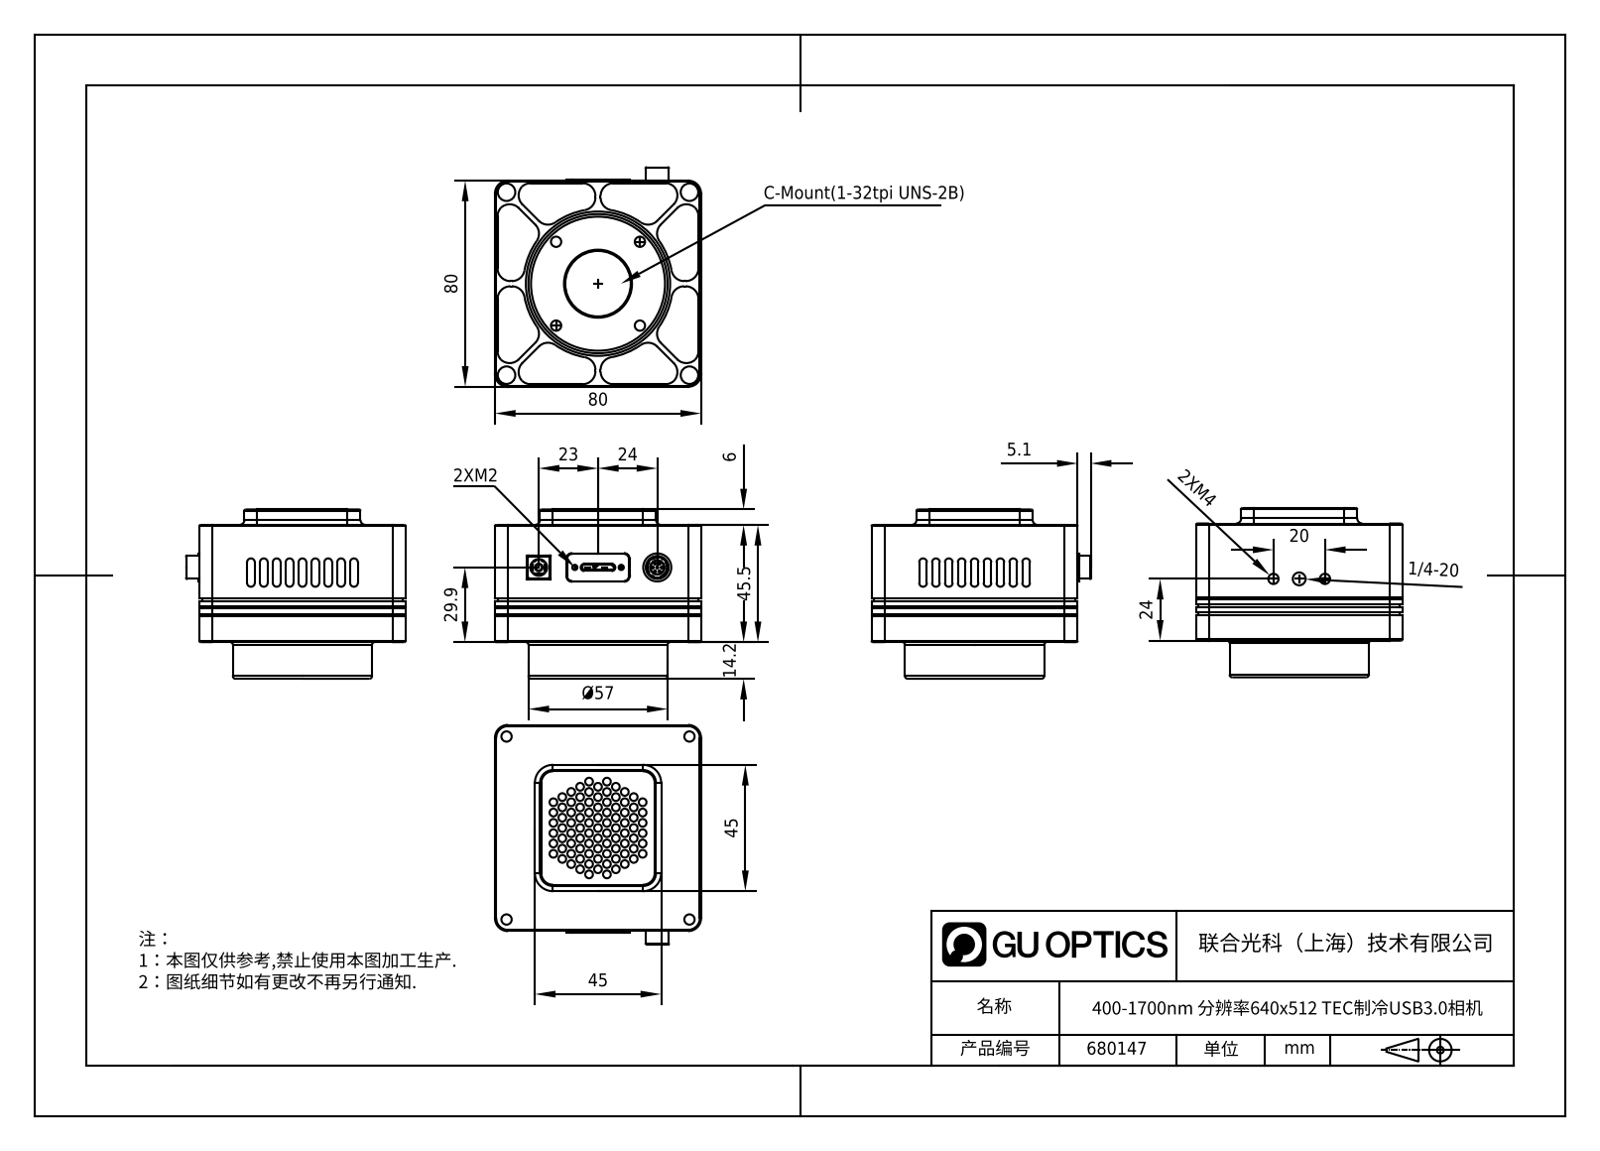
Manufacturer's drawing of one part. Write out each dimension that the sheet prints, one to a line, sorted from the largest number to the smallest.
80
80
Ø57
45.5
45
45
29.9
24
24
23
20
14.2
6
5.1
2XM4
1/4-20
